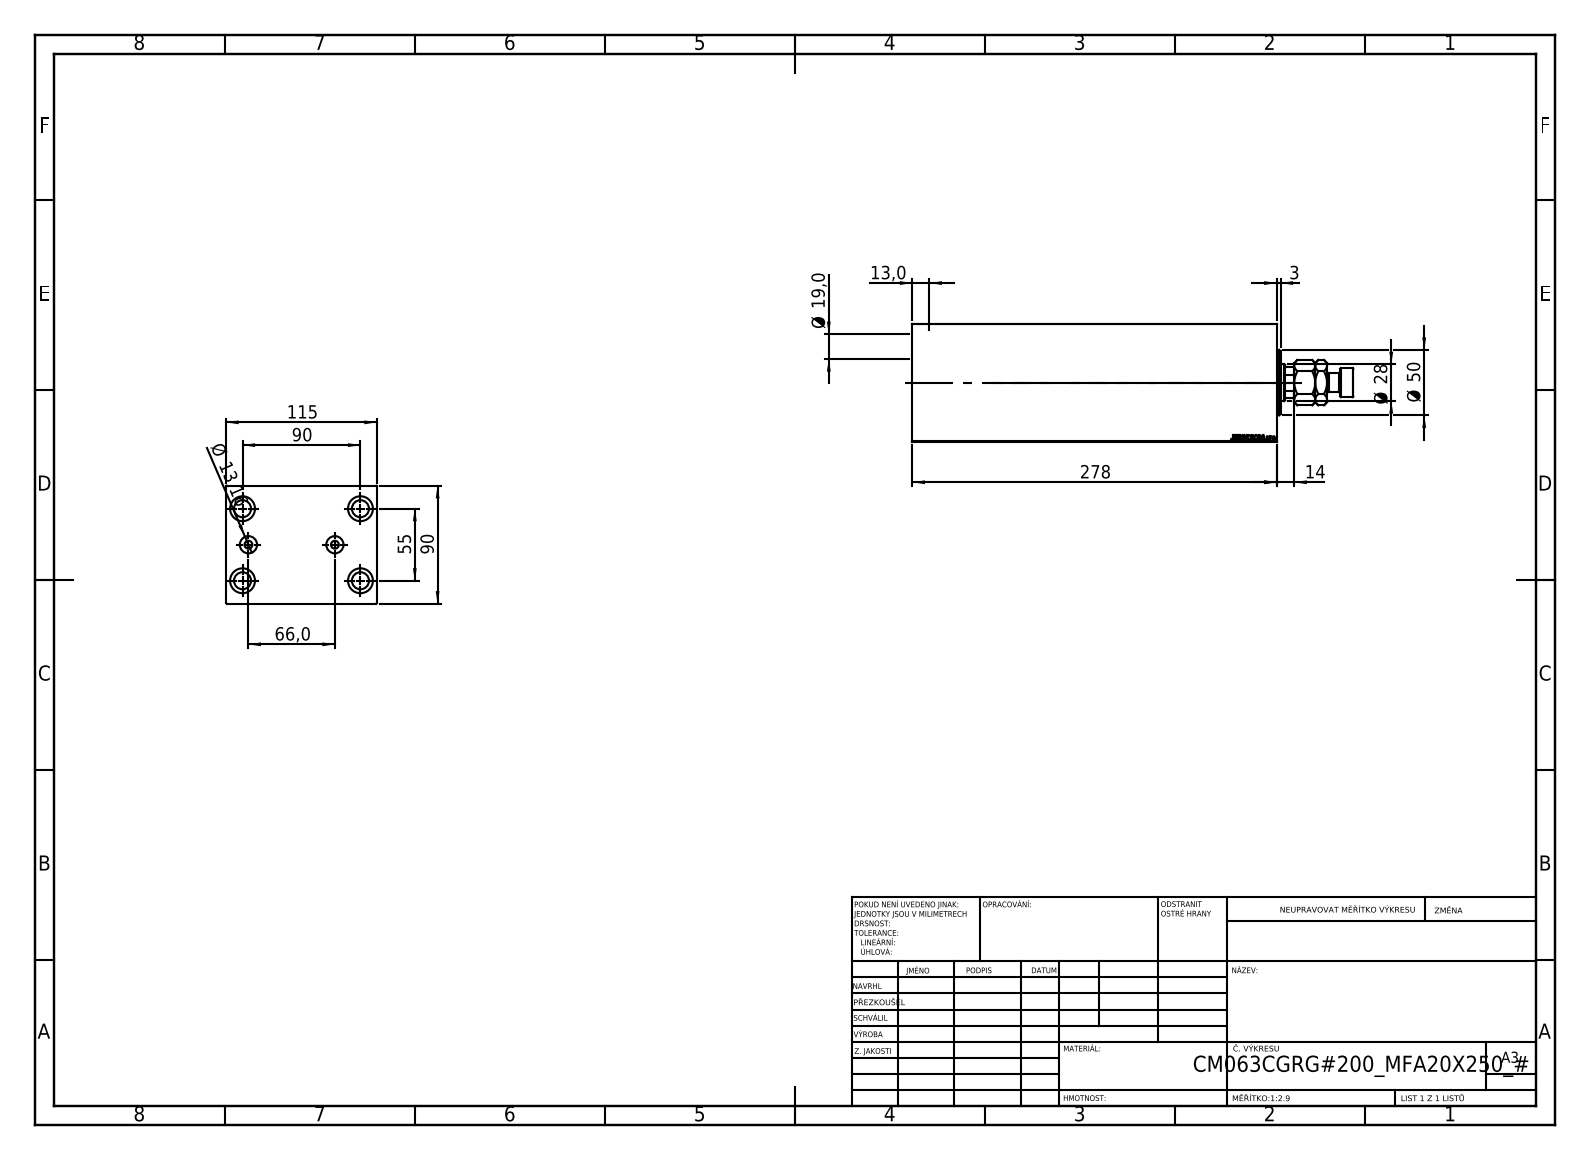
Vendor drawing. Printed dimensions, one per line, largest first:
278
115
90
90
66,0
55
Ø 50
Ø 28
Ø 19,0
14
Ø 13,16
13,0
3
